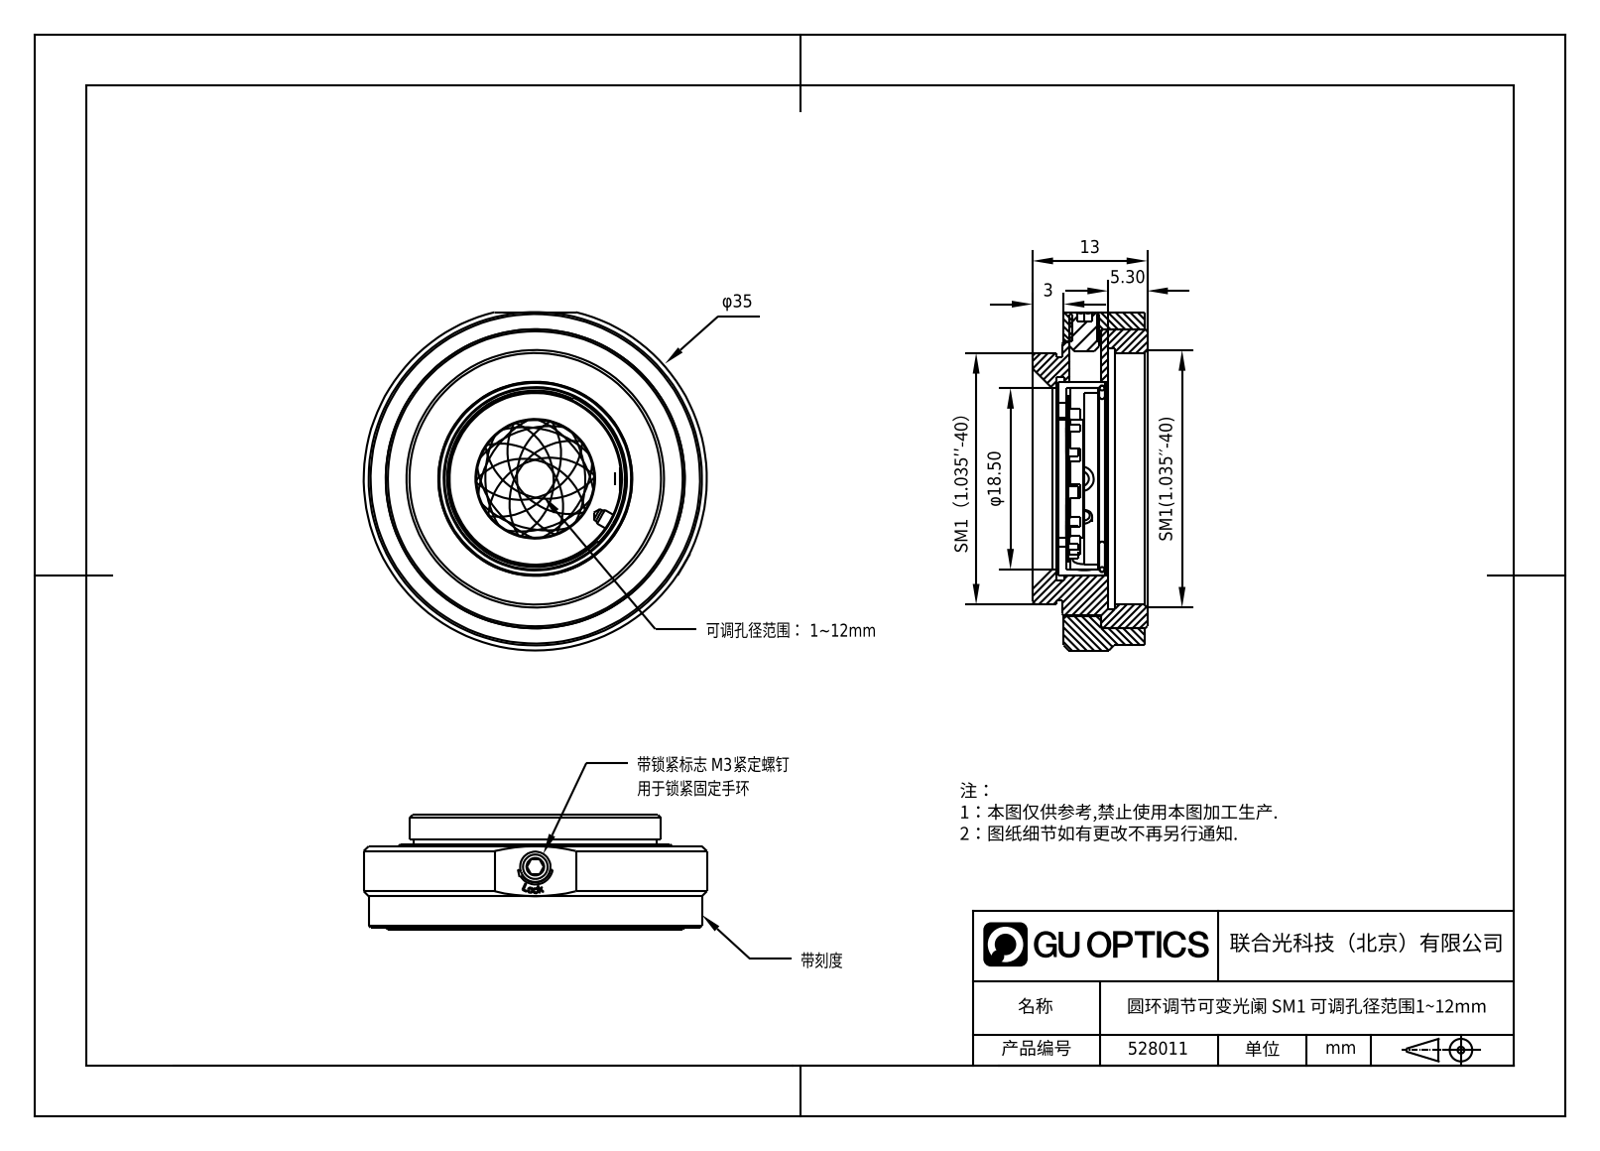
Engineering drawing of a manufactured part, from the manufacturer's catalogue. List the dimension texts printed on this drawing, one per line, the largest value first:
φ18.50
13
5.30
3
SM1(1.035′′-40)
SM1（1.035′′-40）
